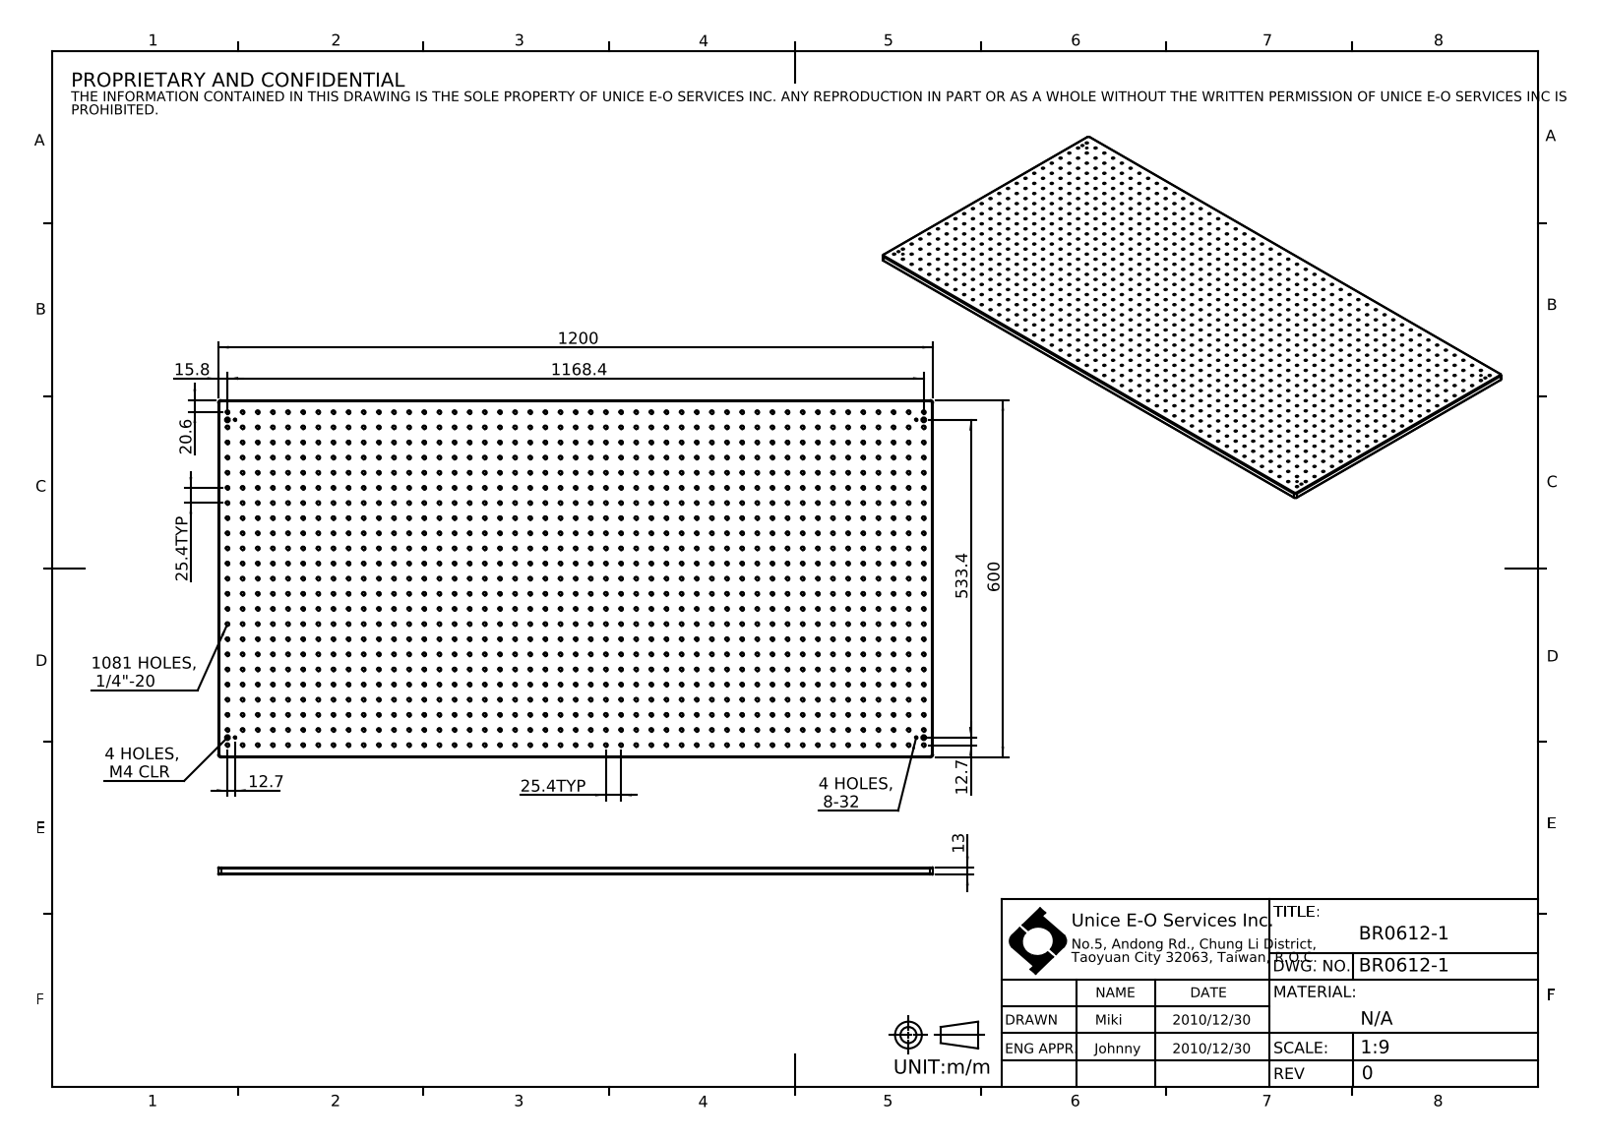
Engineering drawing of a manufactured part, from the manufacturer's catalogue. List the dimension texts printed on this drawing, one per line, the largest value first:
1200
1168.4
1081 HOLES, 1/4"-20
600
533.4
25.4 TYP
25.4 TYP
20.6
15.8
13
12.7
12.7
4 HOLES, 8-32
4 HOLES, M4 CLR
